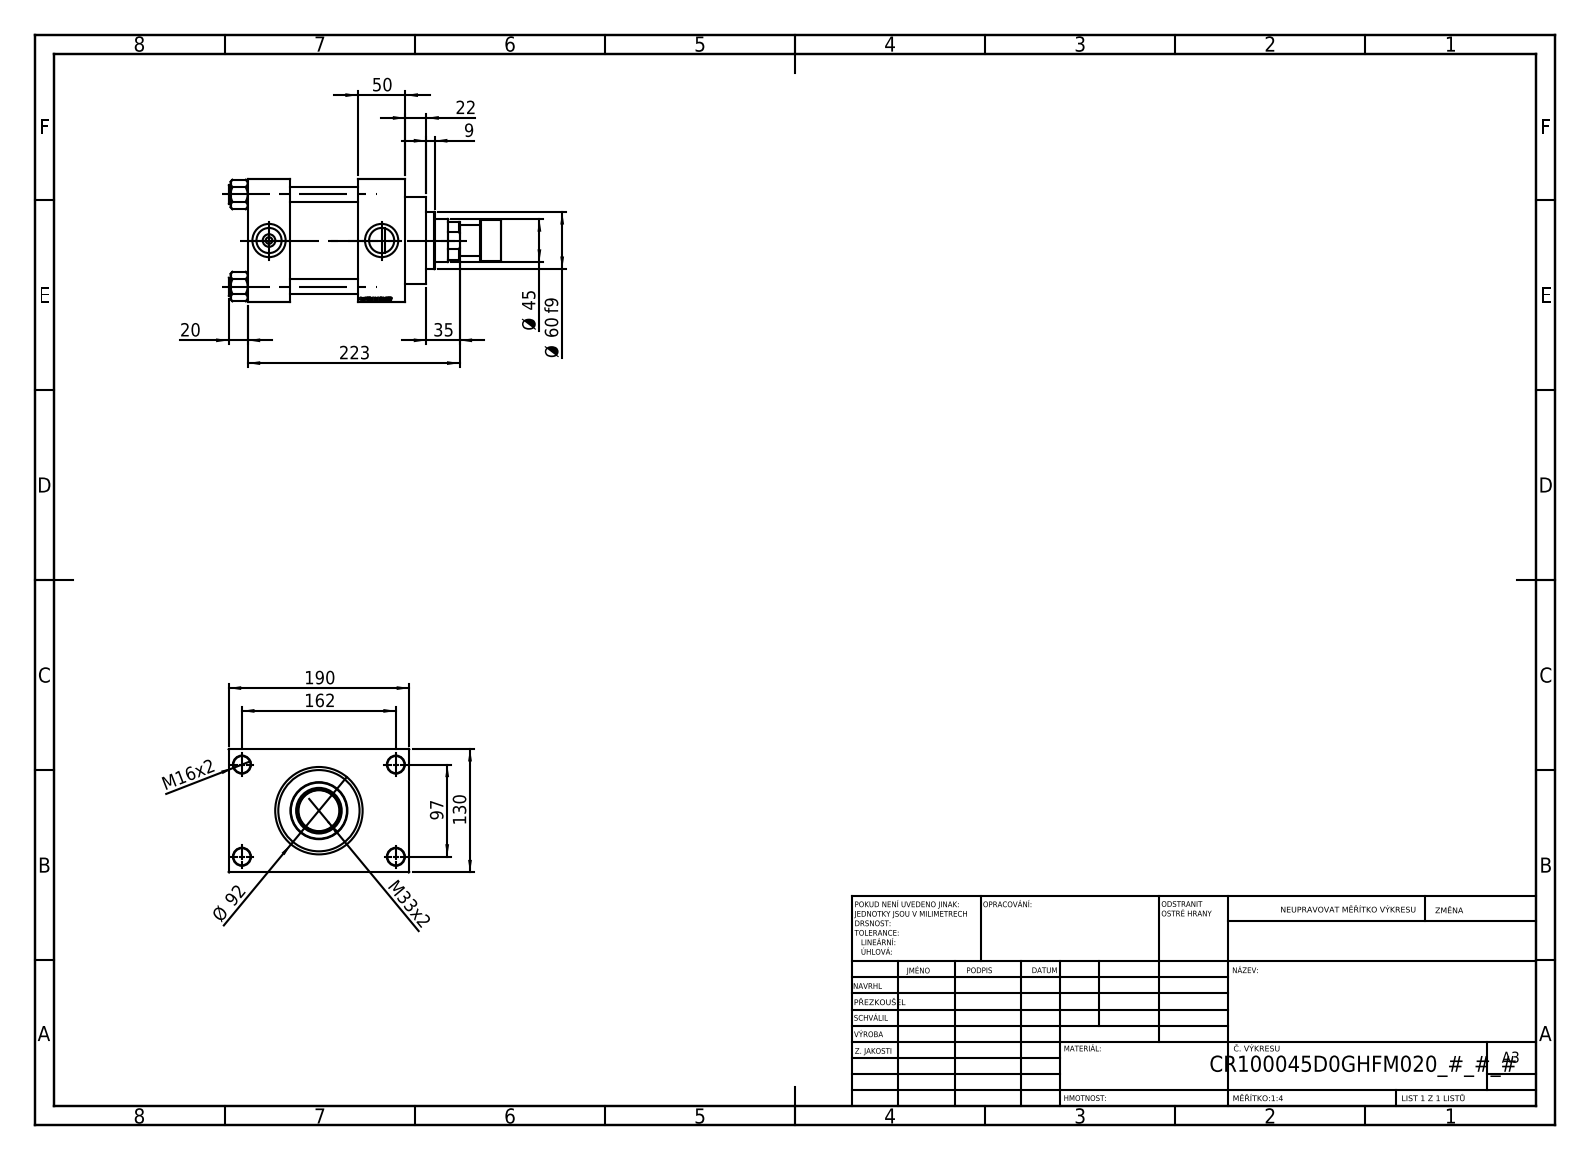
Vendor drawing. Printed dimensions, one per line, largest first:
223
190
162
130
97
Ø 92
Ø 60 f9
50
Ø 45
35
M33x2
22
20
M16x2
9
